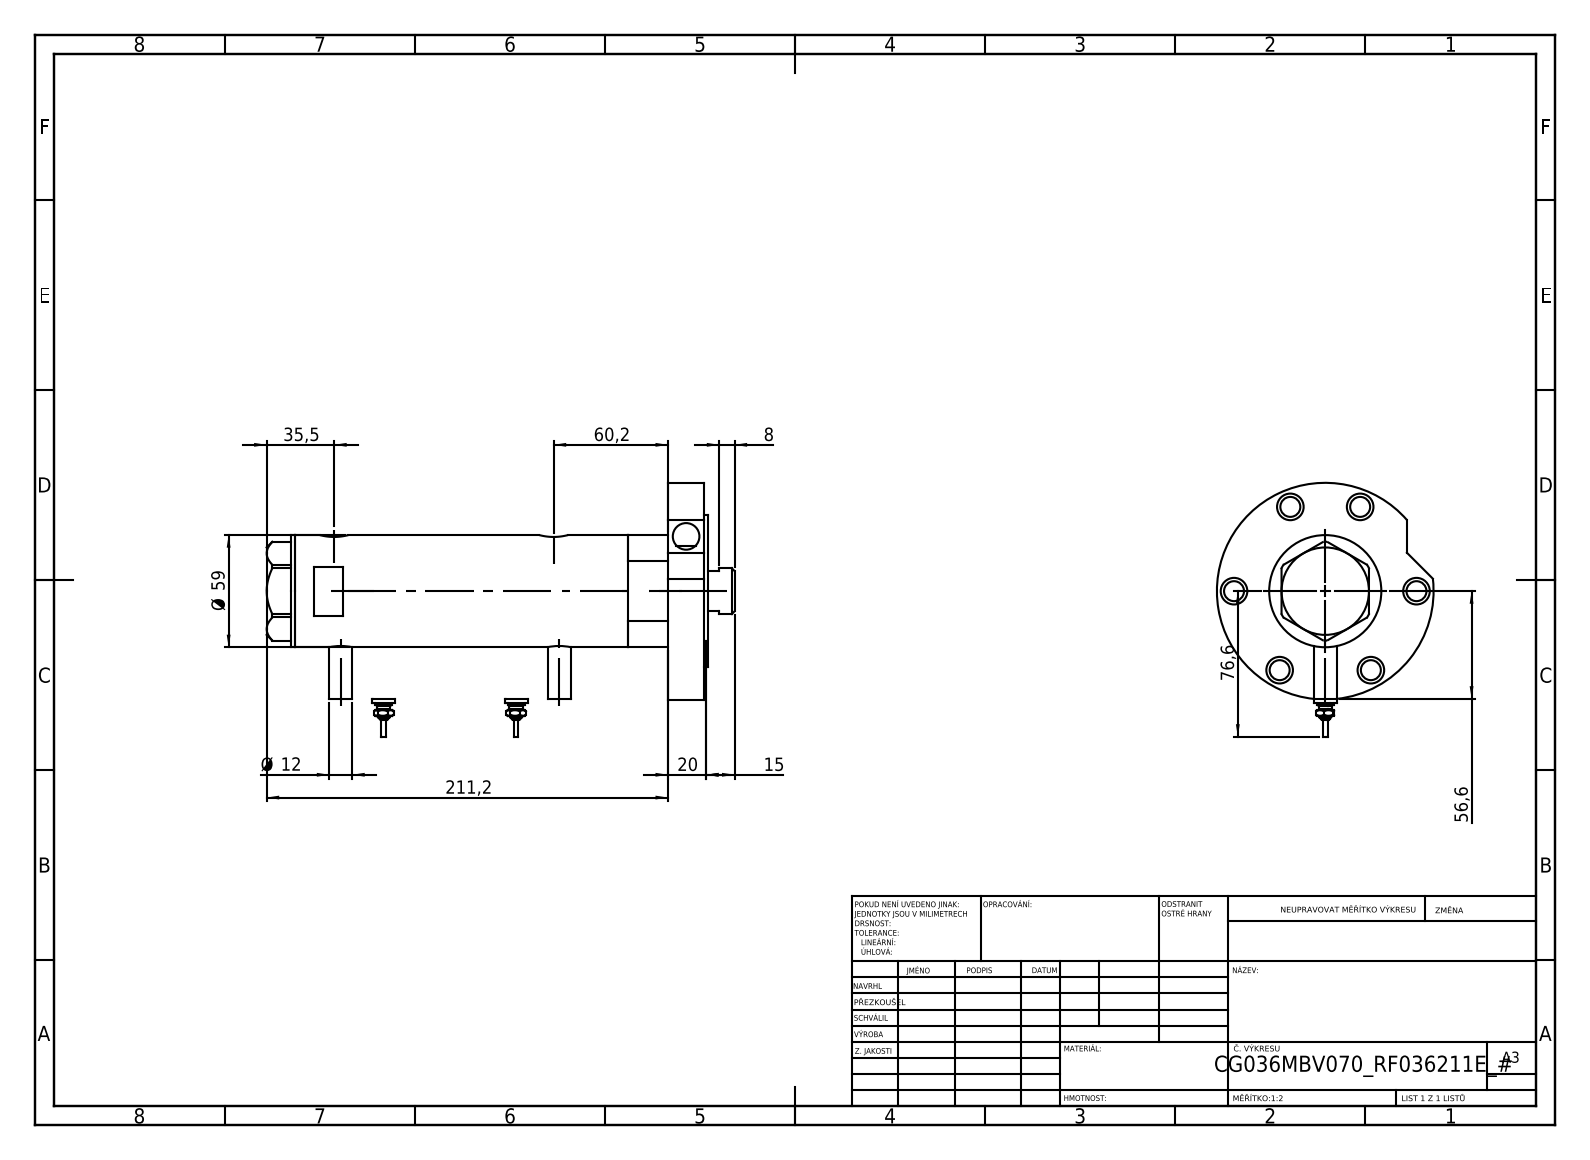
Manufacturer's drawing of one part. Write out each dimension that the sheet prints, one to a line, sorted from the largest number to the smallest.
211,2
76,6
60,2
Ø 59
56,6
35,5
20
15
Ø 12
8
